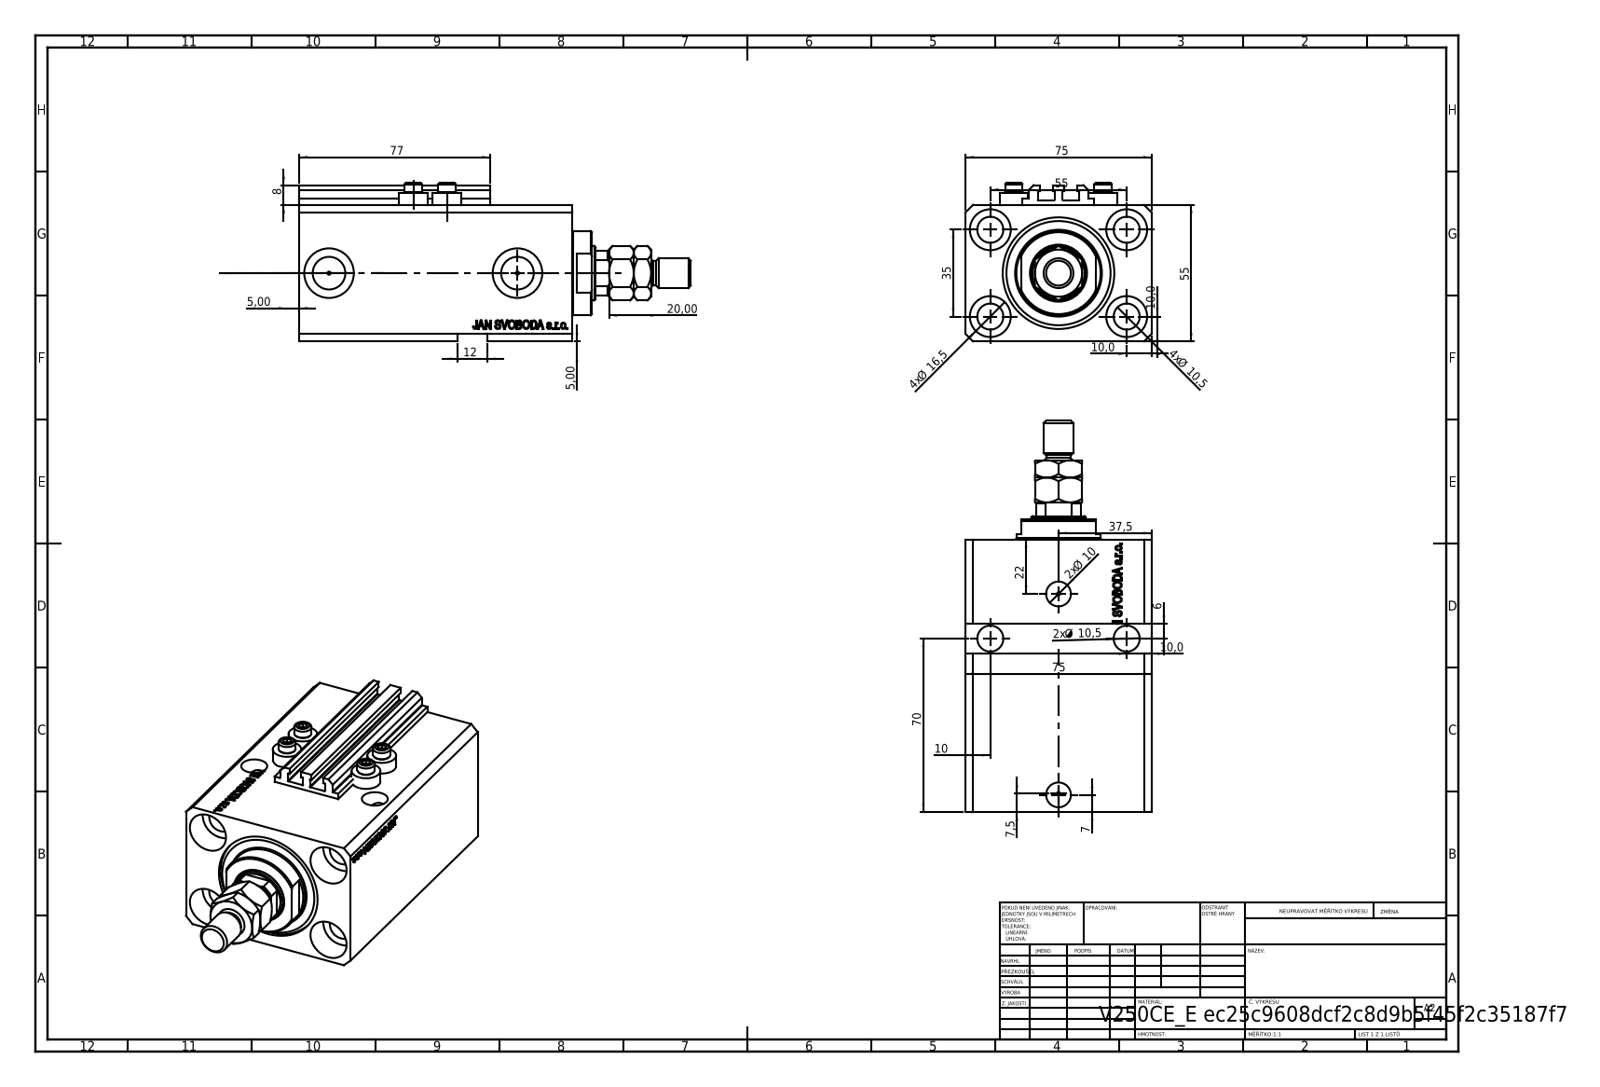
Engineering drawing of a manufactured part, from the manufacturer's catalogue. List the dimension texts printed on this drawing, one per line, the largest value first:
77
75
75
70
55
55
37,5
35
22
20,00
4x Ø 16,5
12
4x Ø 10,5
2x Ø 10,5
10,0
10,0
2x Ø 10
10,0
10
8
7,5
7
6
5,00
5,00
